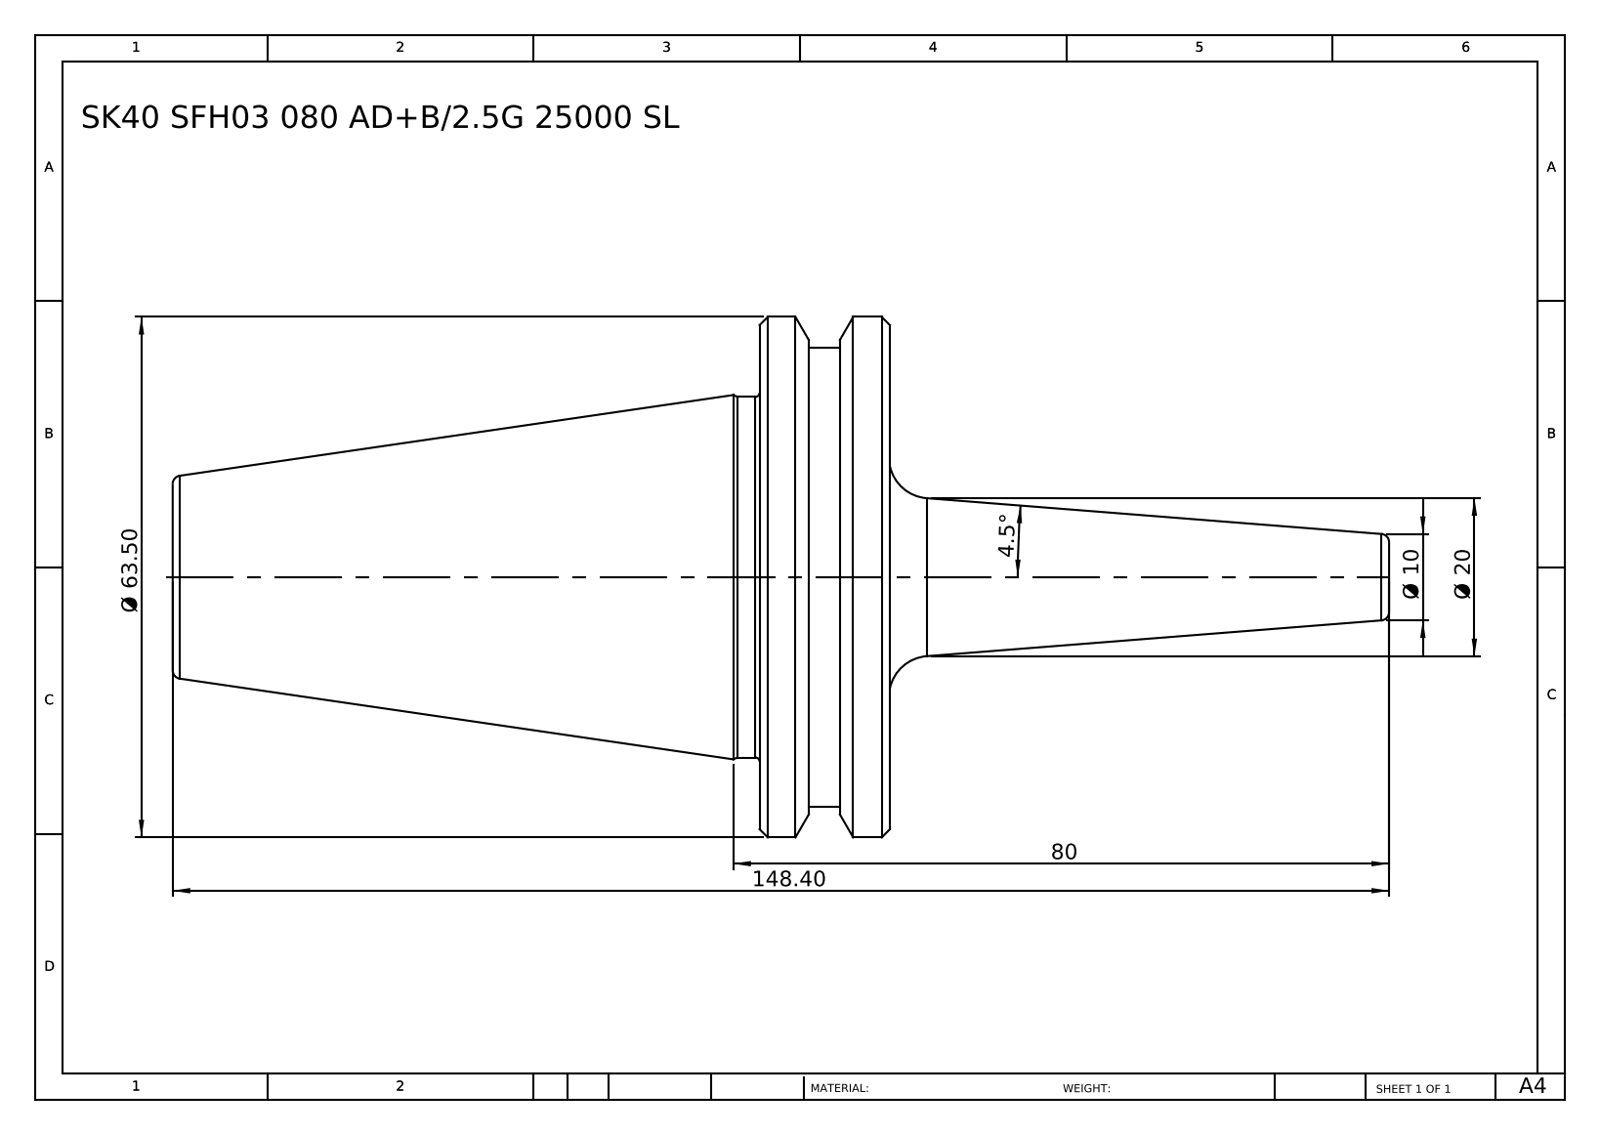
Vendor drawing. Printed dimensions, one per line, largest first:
148.40
80
Ø 63.50
Ø 20
Ø 10
4.5°
